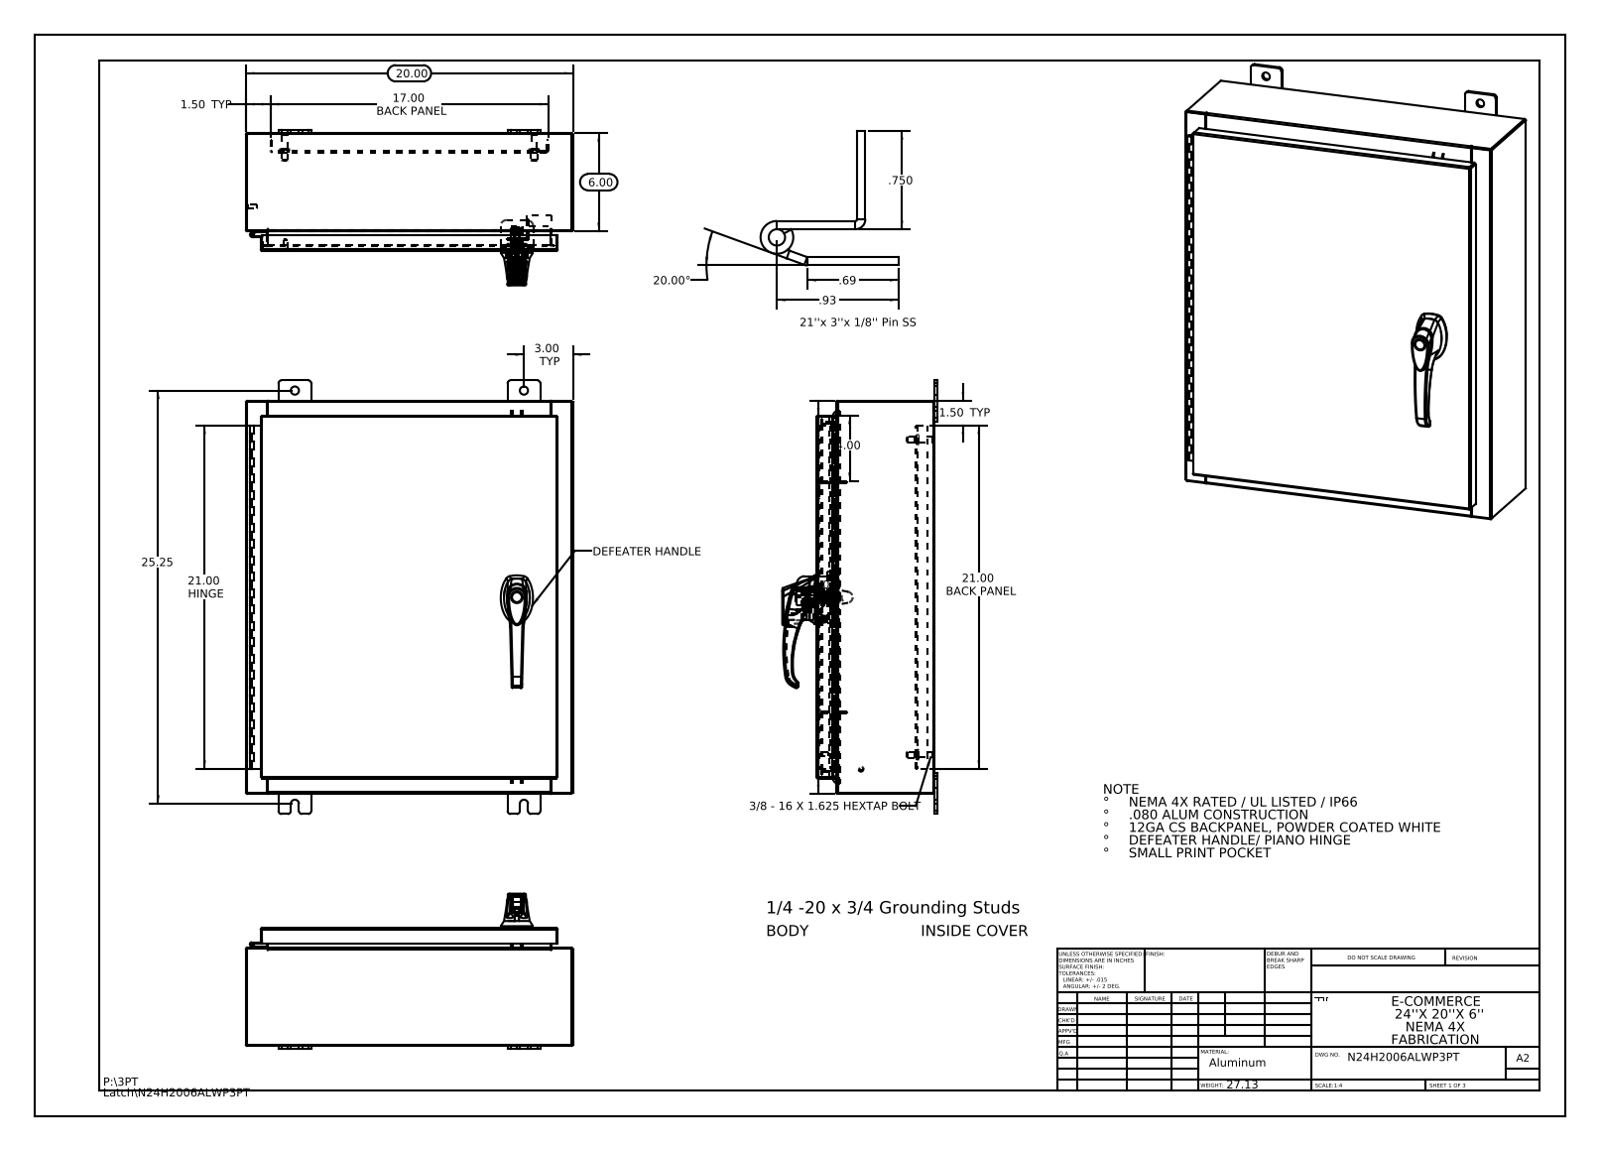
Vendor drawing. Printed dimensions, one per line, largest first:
25.25
24.00
21.00 HINGE
21.00 BACK PANEL
20.00
20.00°
17.00 BACK PANEL
6.00
4.00
3.00 TYP
1.50 TYP
1.50 TYP
.93
.750
.69
